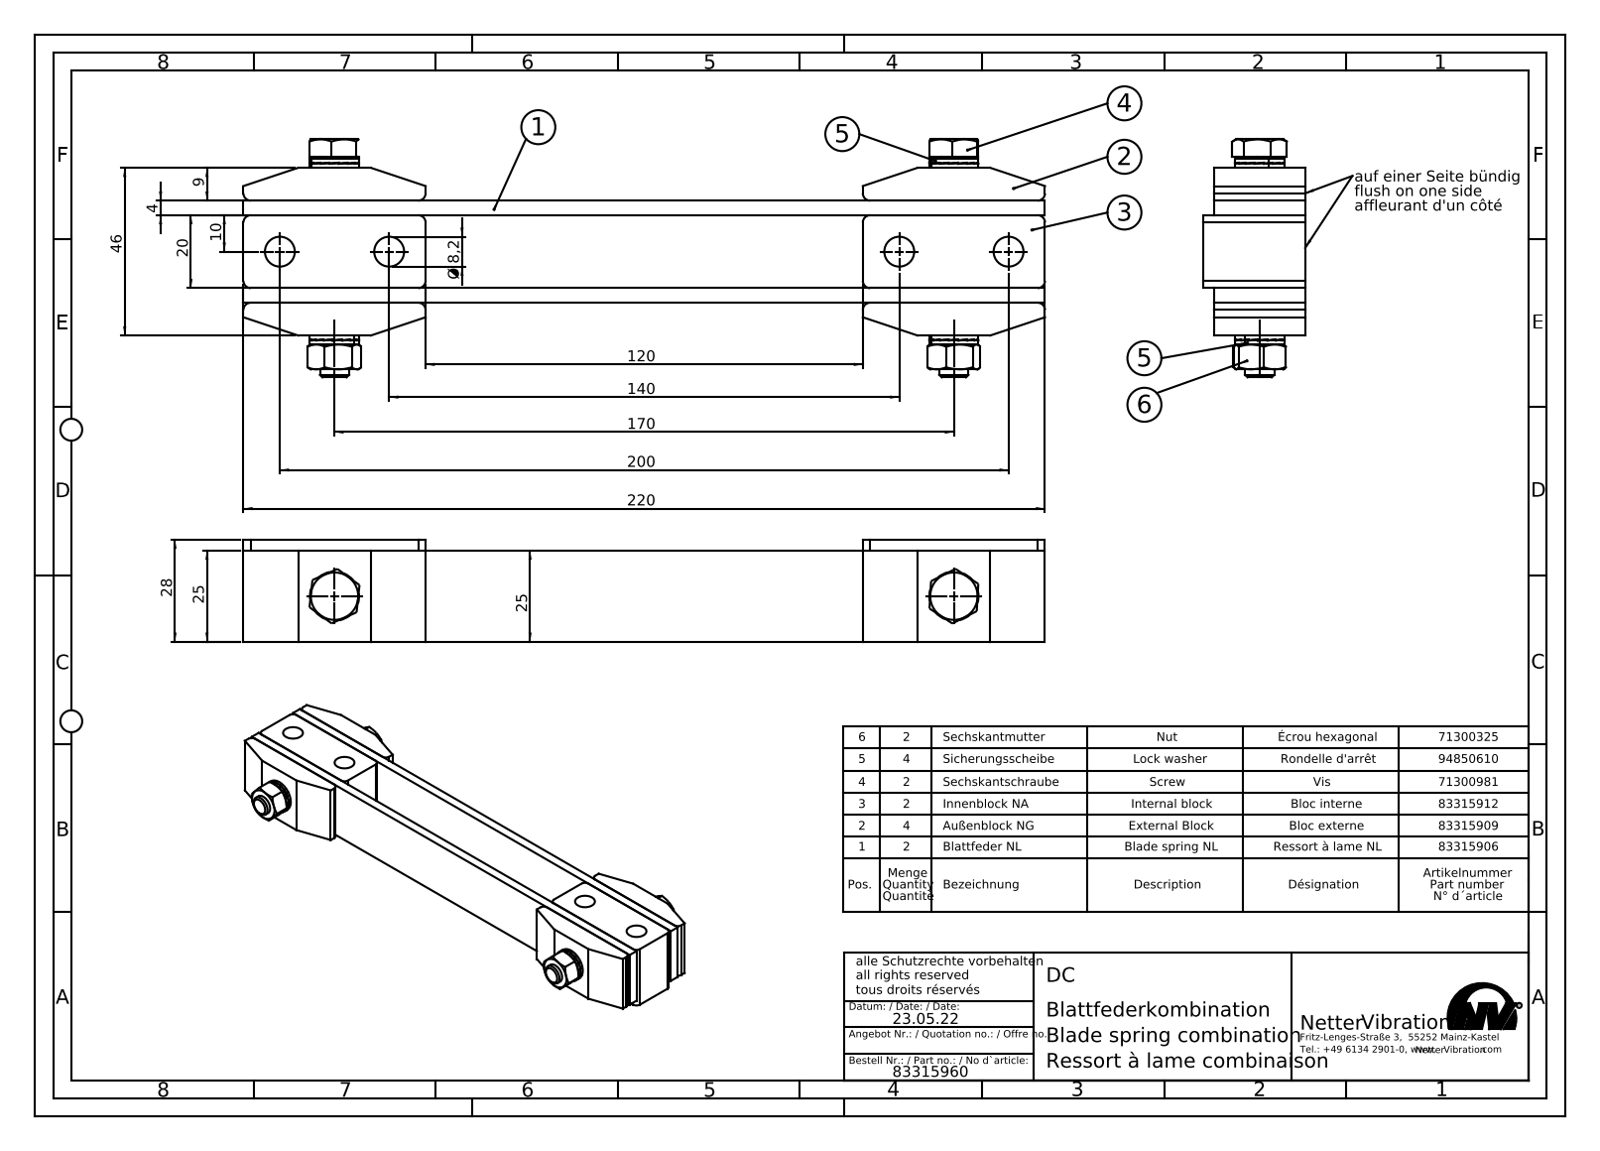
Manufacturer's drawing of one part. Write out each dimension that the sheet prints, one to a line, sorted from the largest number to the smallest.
220
200
170
140
120
46
28
25
25
20
10
9
Ø 8,2
4
